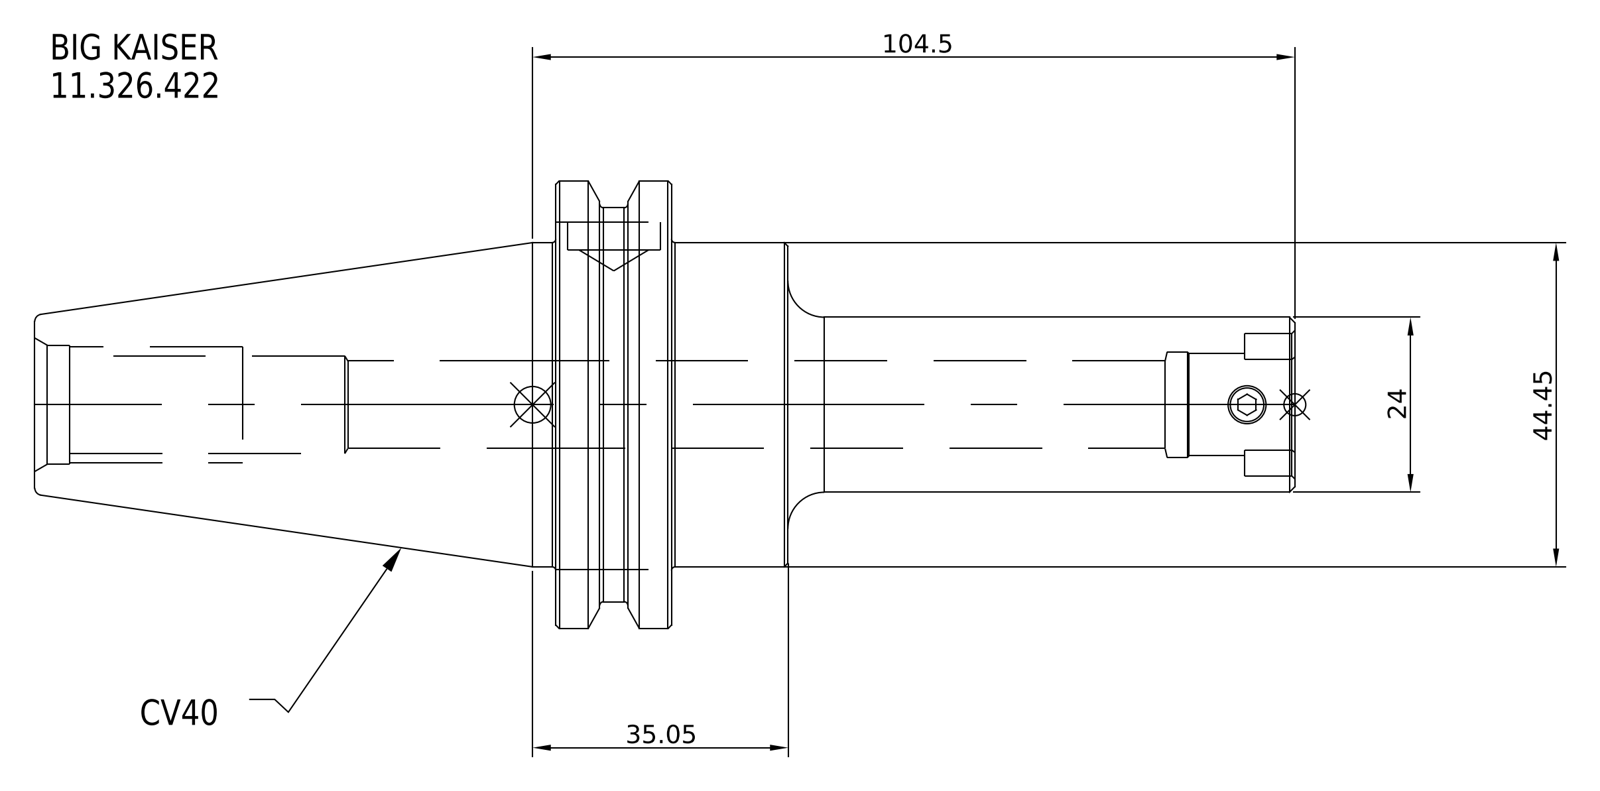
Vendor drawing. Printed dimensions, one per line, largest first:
104.5
44.45
35.05
24
